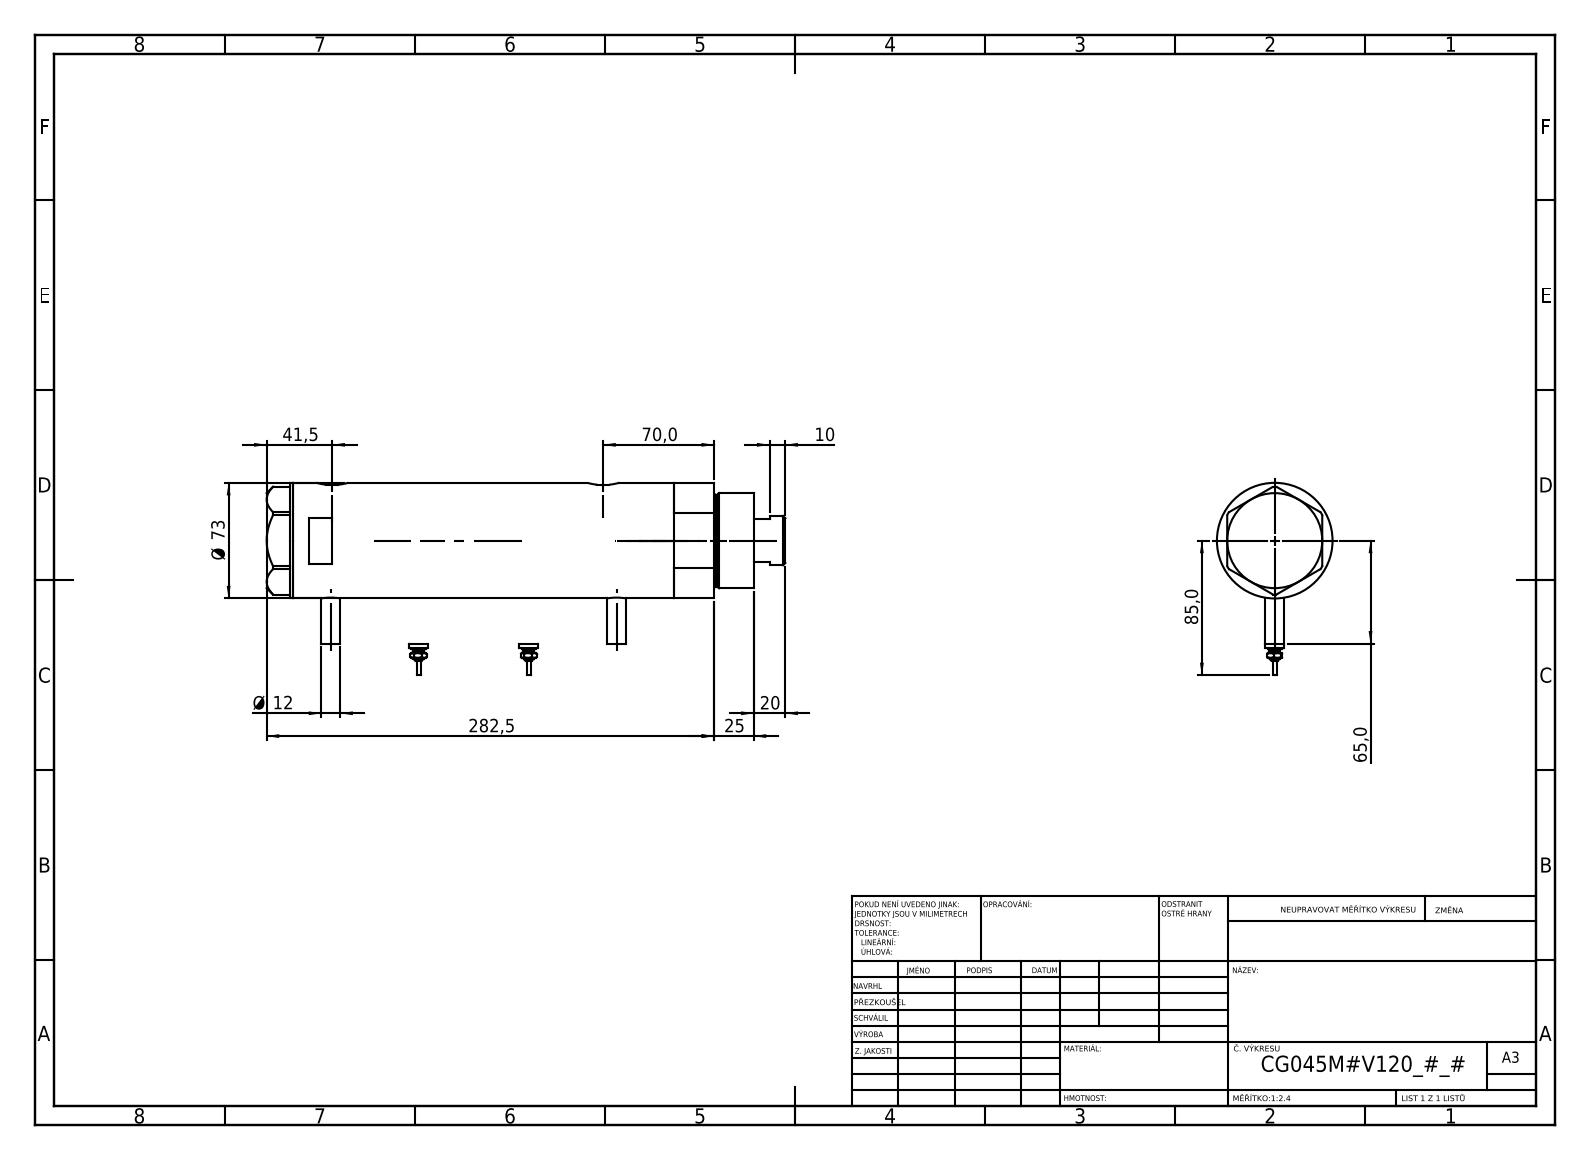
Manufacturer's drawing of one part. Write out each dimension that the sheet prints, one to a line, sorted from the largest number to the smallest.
282,5
85,0
Ø 73
70,0
65,0
41,5
25
20
Ø 12
10
